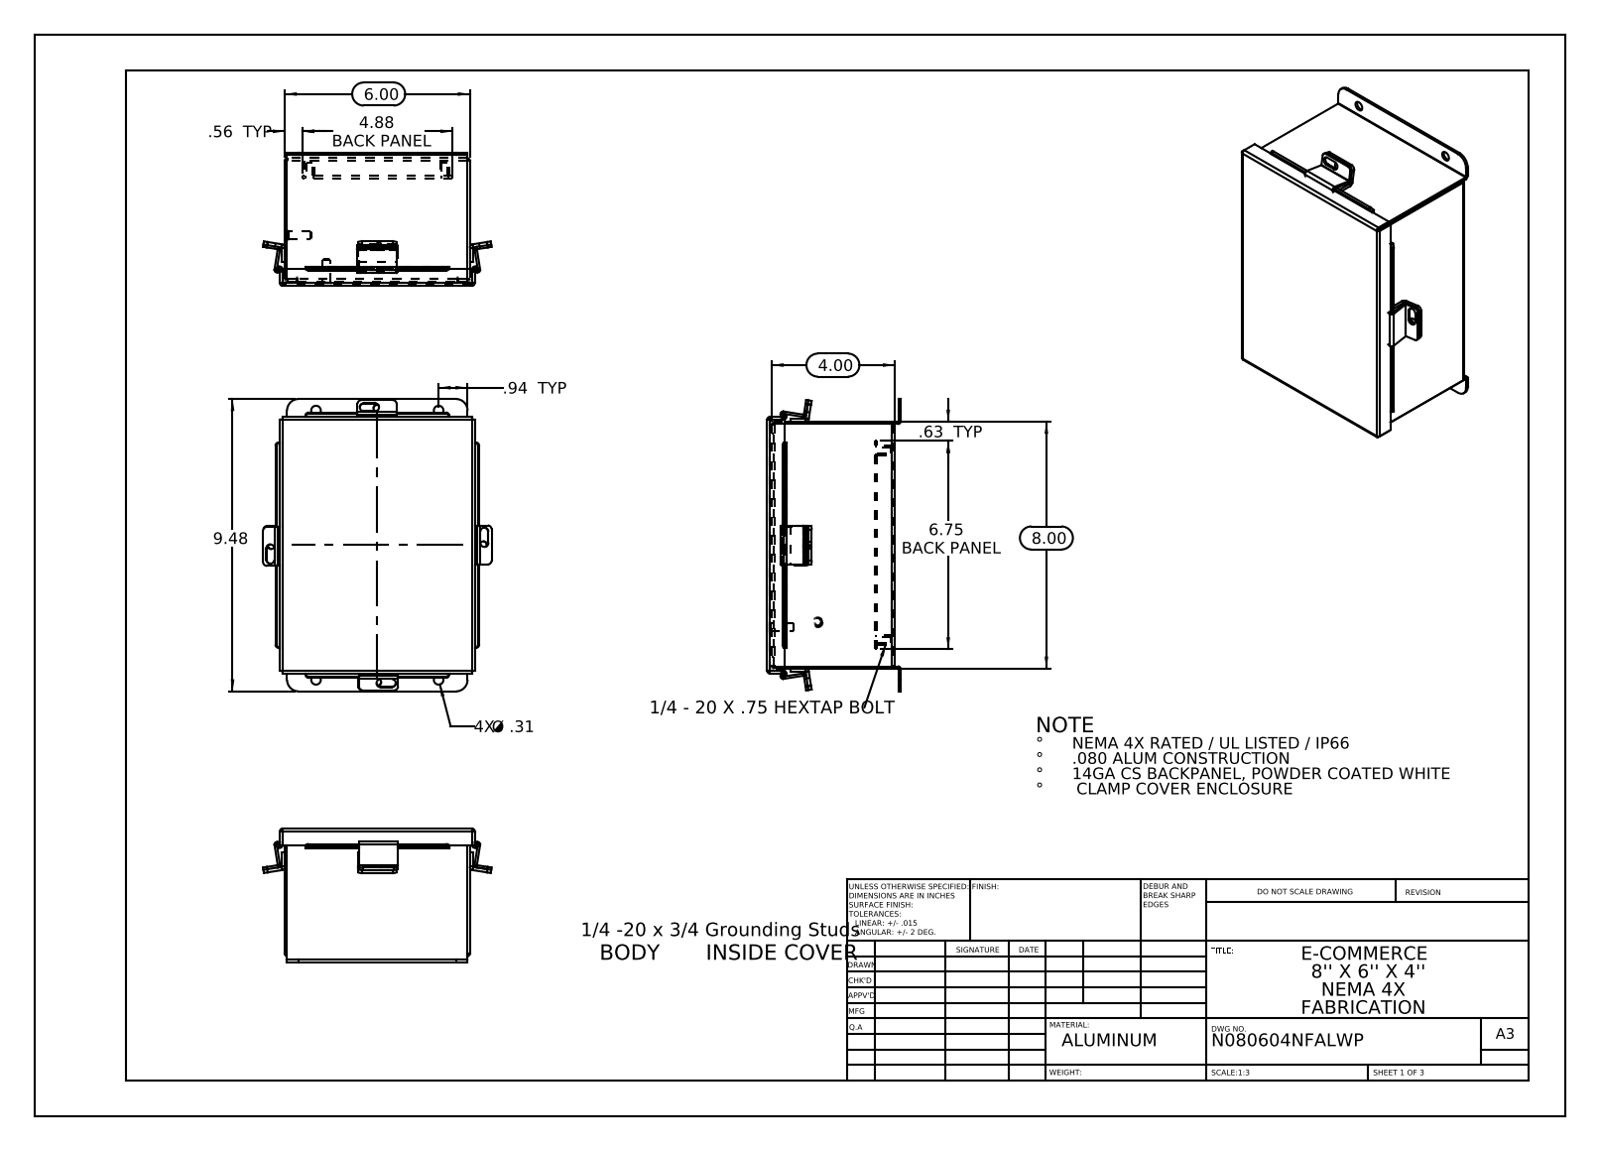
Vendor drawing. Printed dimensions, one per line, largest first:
9.48
8.00
6.75 BACK PANEL
6.00
4.88 BACK PANEL
4.00
.94 TYP
.63 TYP
.56 TYP
4X Ø .31
